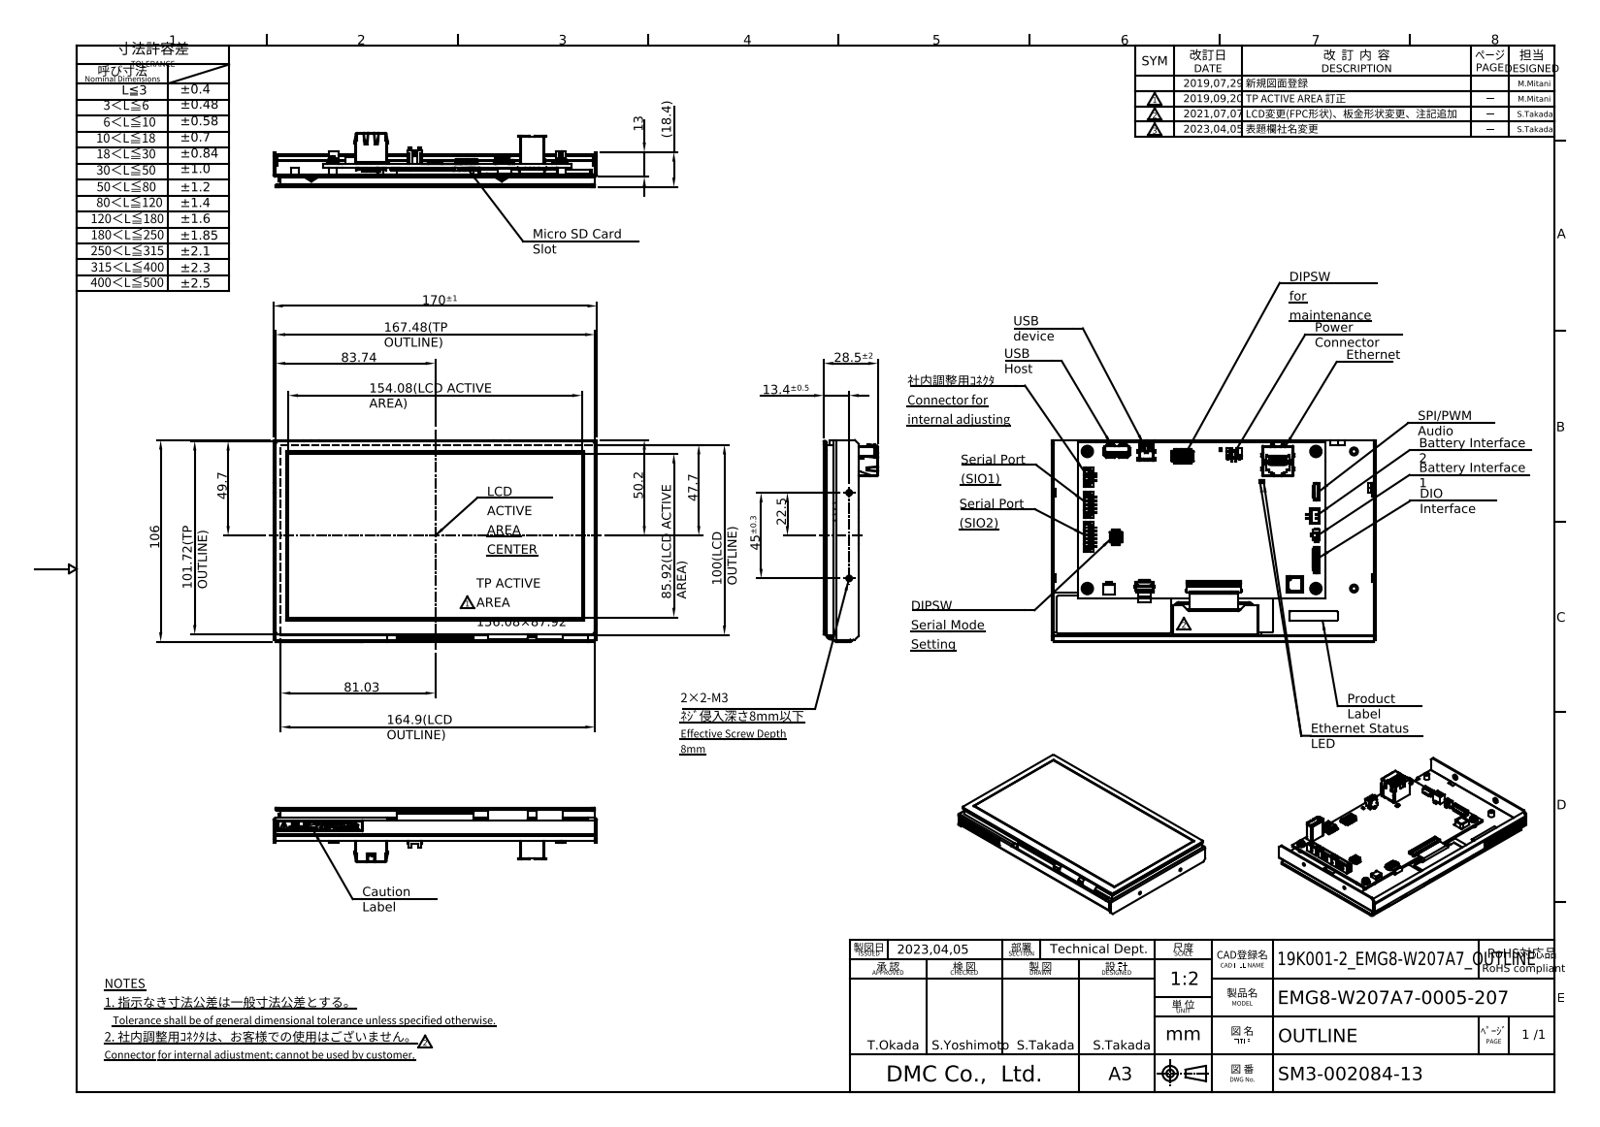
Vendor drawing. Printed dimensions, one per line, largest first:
170±1
167.48(TP OUTLINE)
164.9(LCD OUTLINE)
154.08(LCD ACTIVE AREA)
106
101.72(TP OUTLINE)
100(LCD OUTLINE)
85.92(LCD ACTIVE AREA)
83.74
81.03
50.2
49.7
47.7
45±0.3
28.5±2
22.5
(18.4)
13.4±0.5
13
